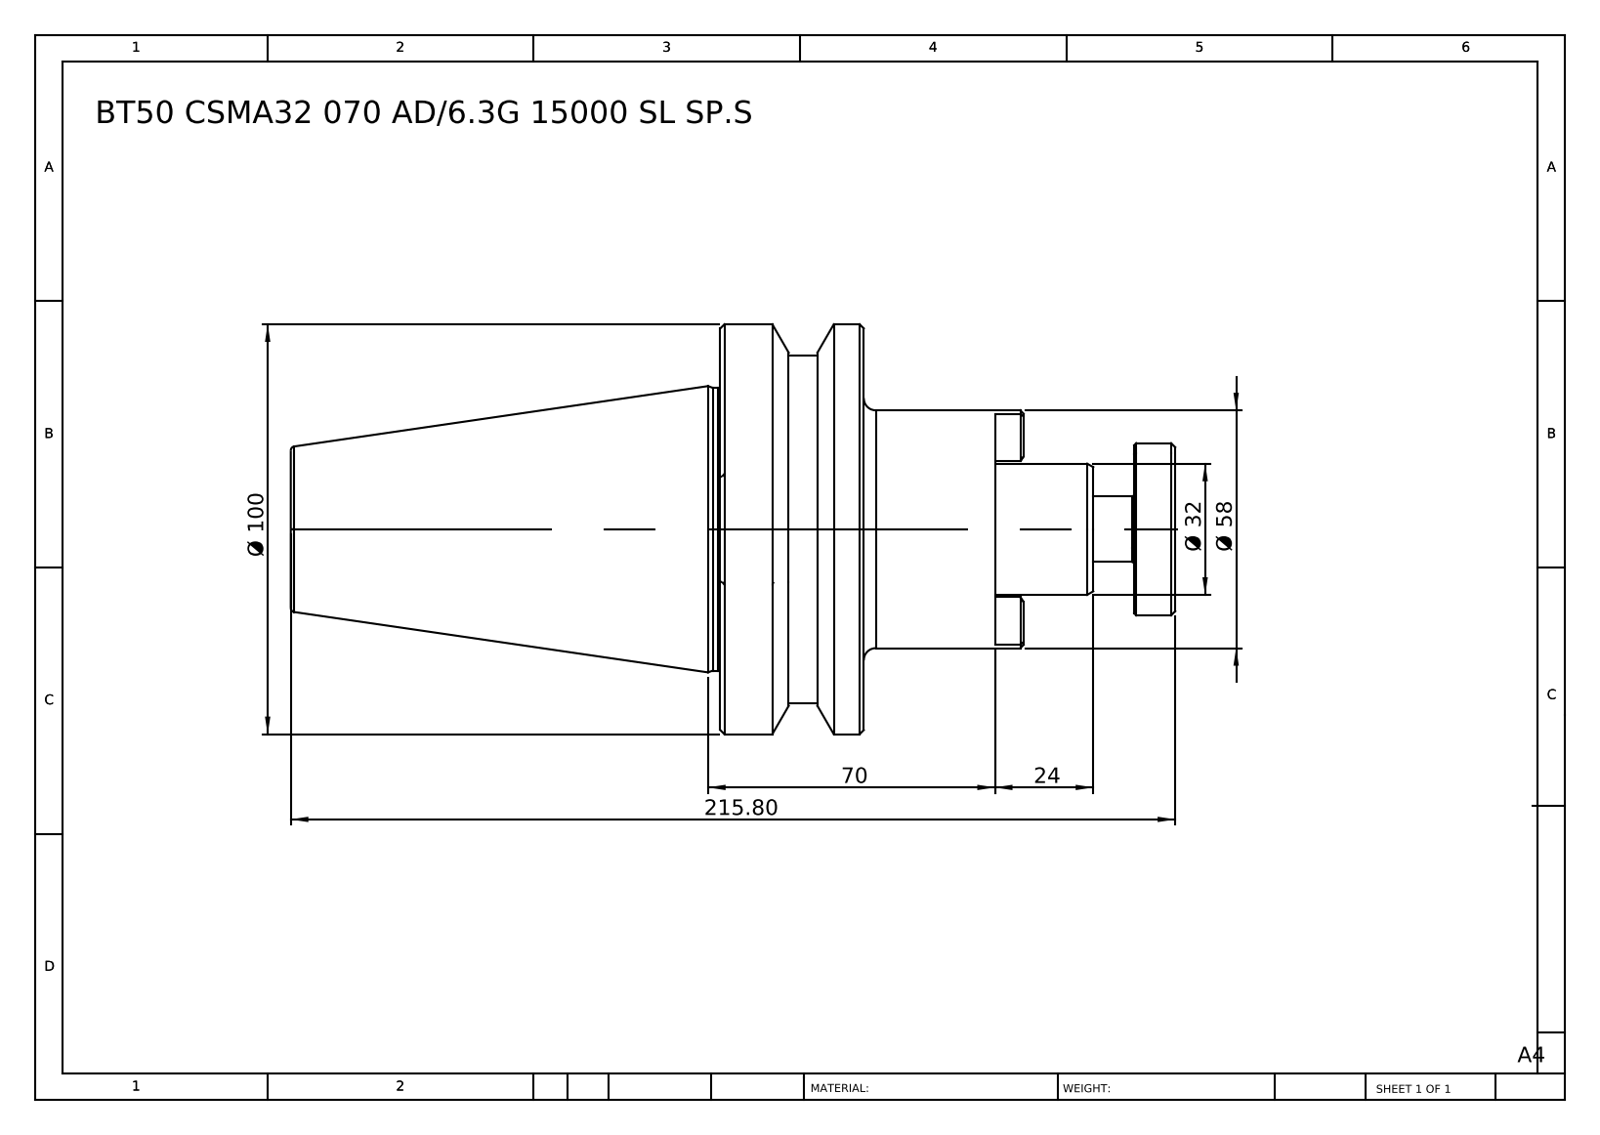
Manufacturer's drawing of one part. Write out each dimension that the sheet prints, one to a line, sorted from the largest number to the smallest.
215.80
Ø 100
70
Ø 58
Ø 32
24
